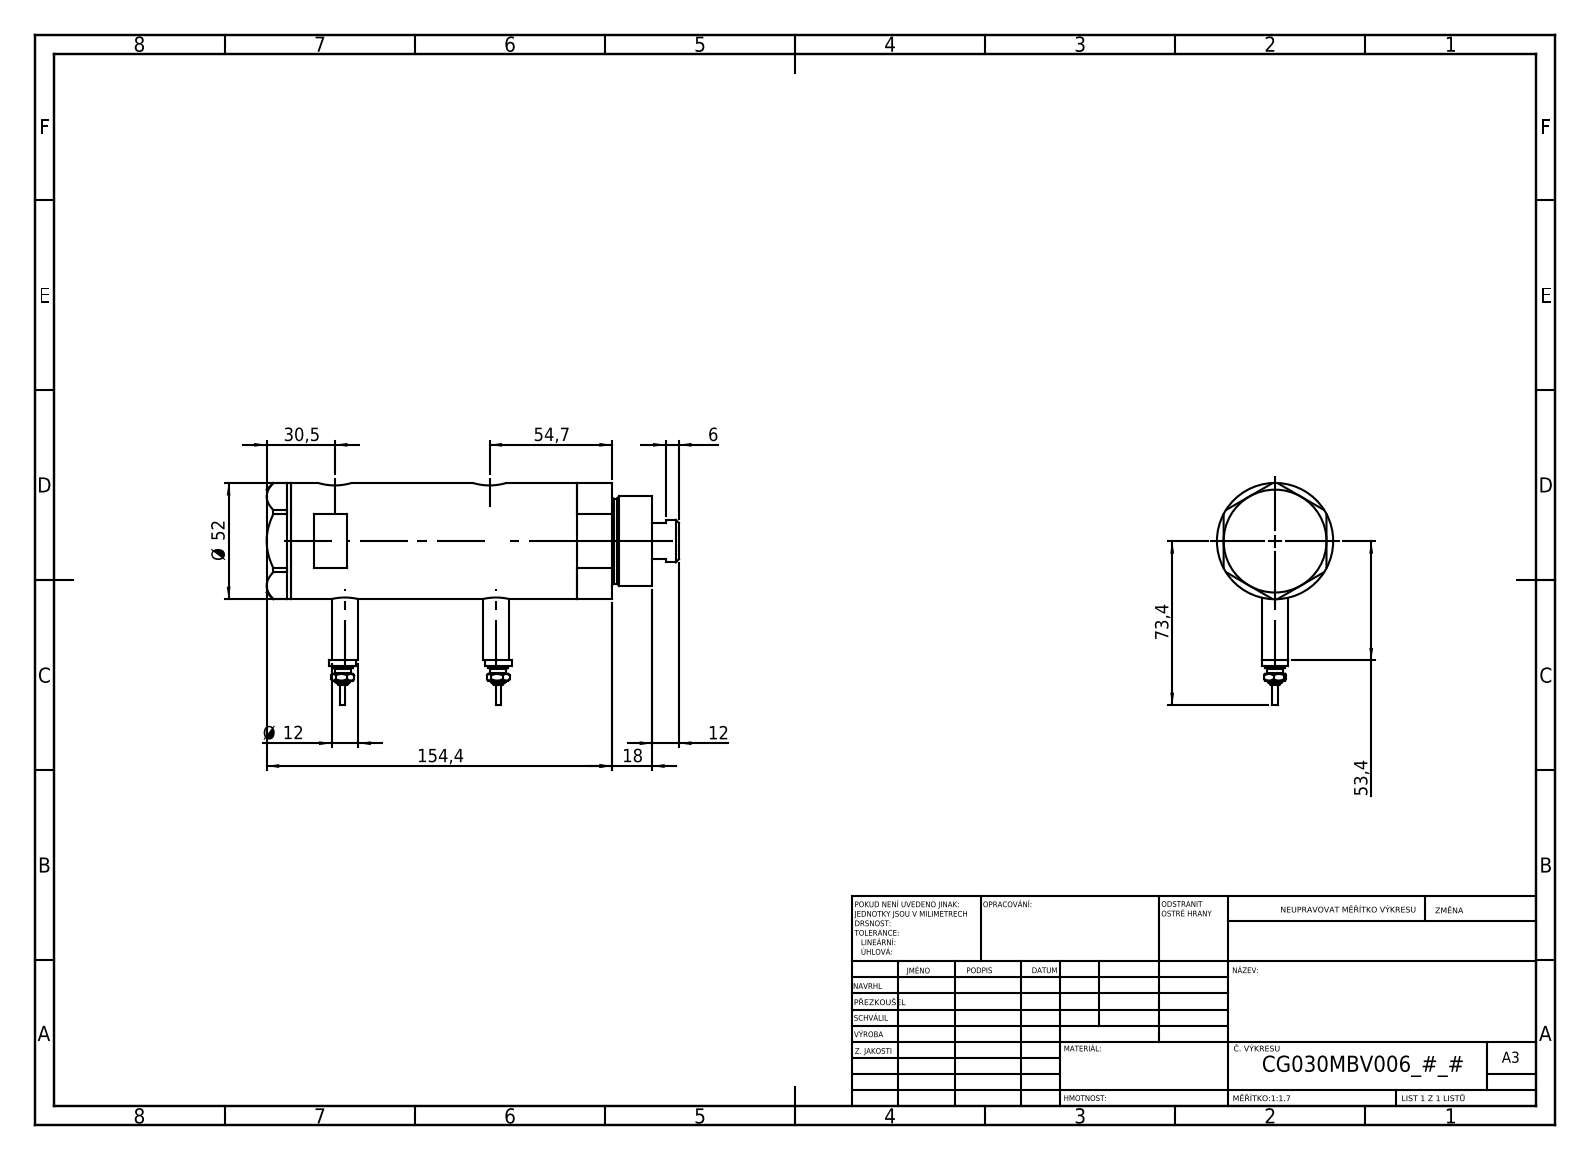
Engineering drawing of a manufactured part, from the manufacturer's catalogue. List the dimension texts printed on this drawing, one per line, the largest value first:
154,4
73,4
54,7
53,4
Ø 52
30,5
18
12
Ø 12
6
